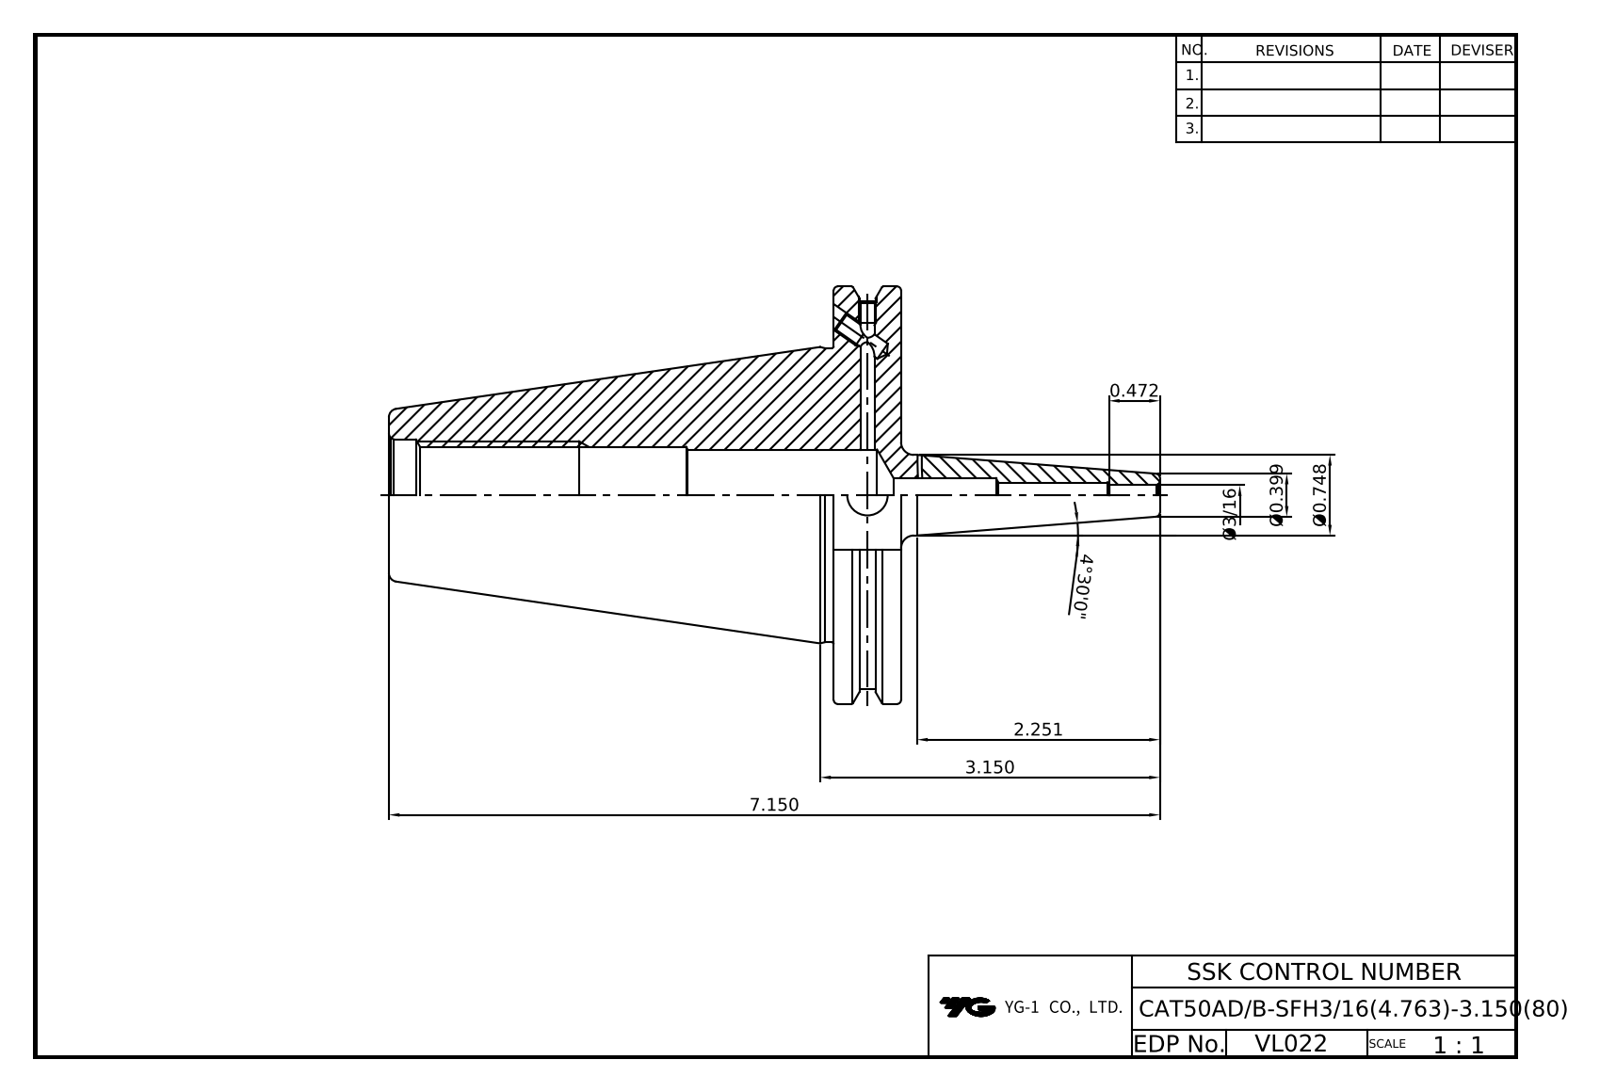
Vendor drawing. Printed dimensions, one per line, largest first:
7.150
4°30'0"
3.150
2.251
Ø0.748
0.472
Ø0.399
